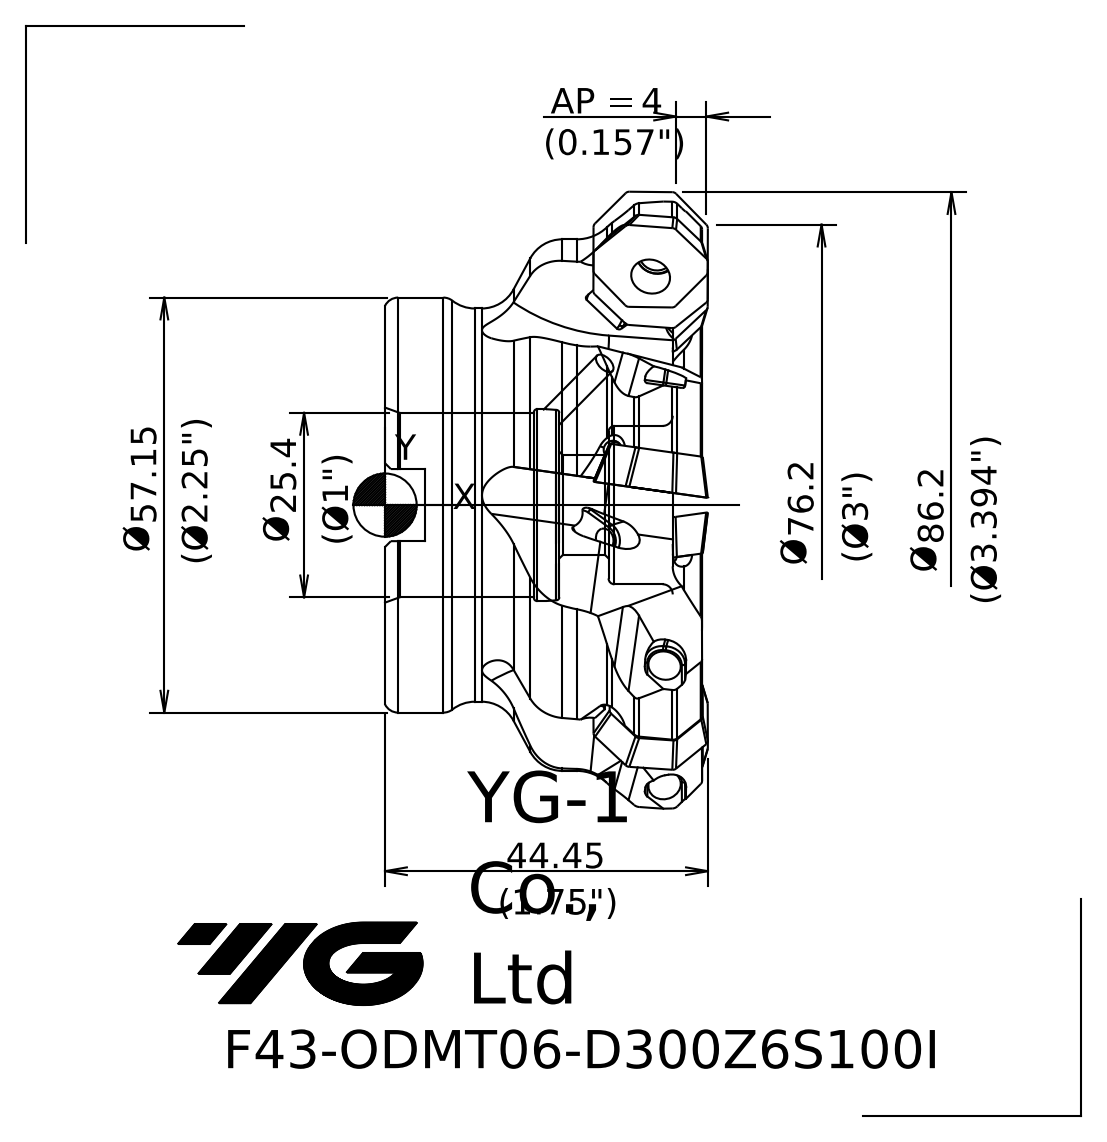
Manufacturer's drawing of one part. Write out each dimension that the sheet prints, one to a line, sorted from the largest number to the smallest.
86.2 Ø
76.2 Ø
57.15 Ø
44.45
25.4 Ø
AP = 4
